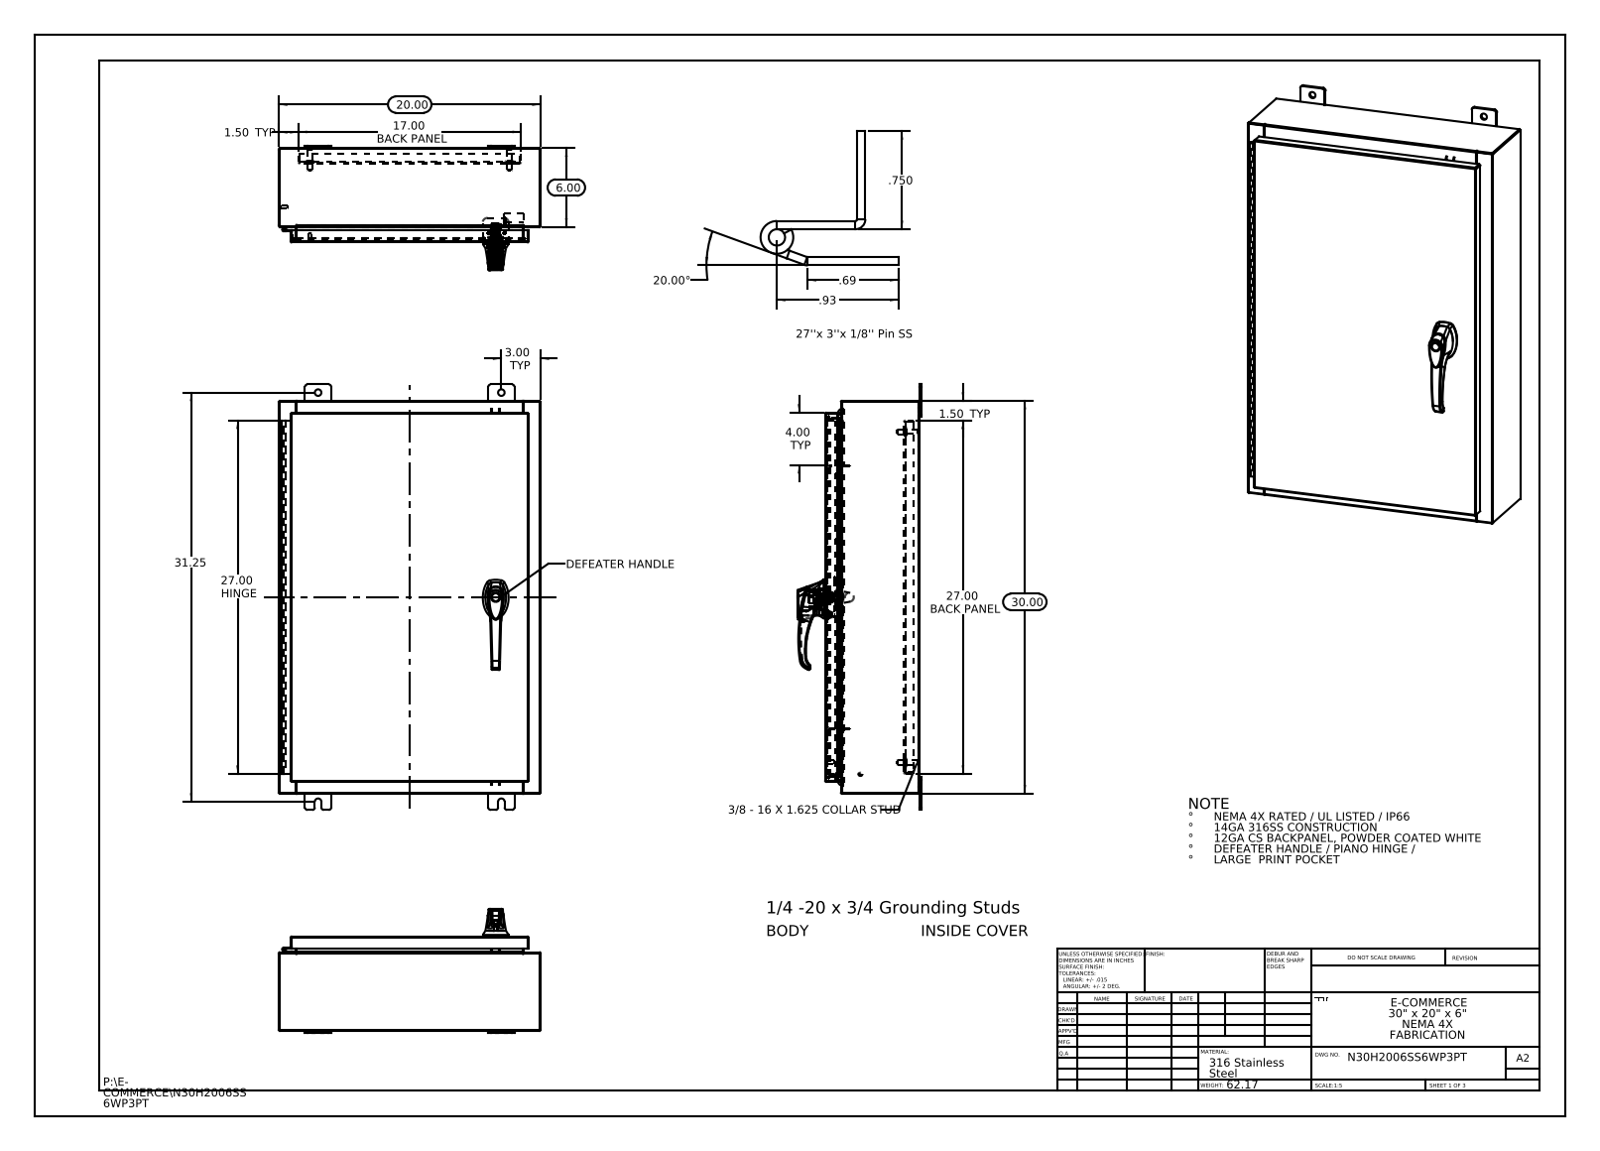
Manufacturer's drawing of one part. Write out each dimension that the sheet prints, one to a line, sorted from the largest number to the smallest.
31.25
30.00
27.00 HINGE
27.00 BACK PANEL
20.00
20.00°
17.00 BACK PANEL
6.00
4.00 TYP
3.00 TYP
1.50 TYP
1.50 TYP
.93
.750
.69
